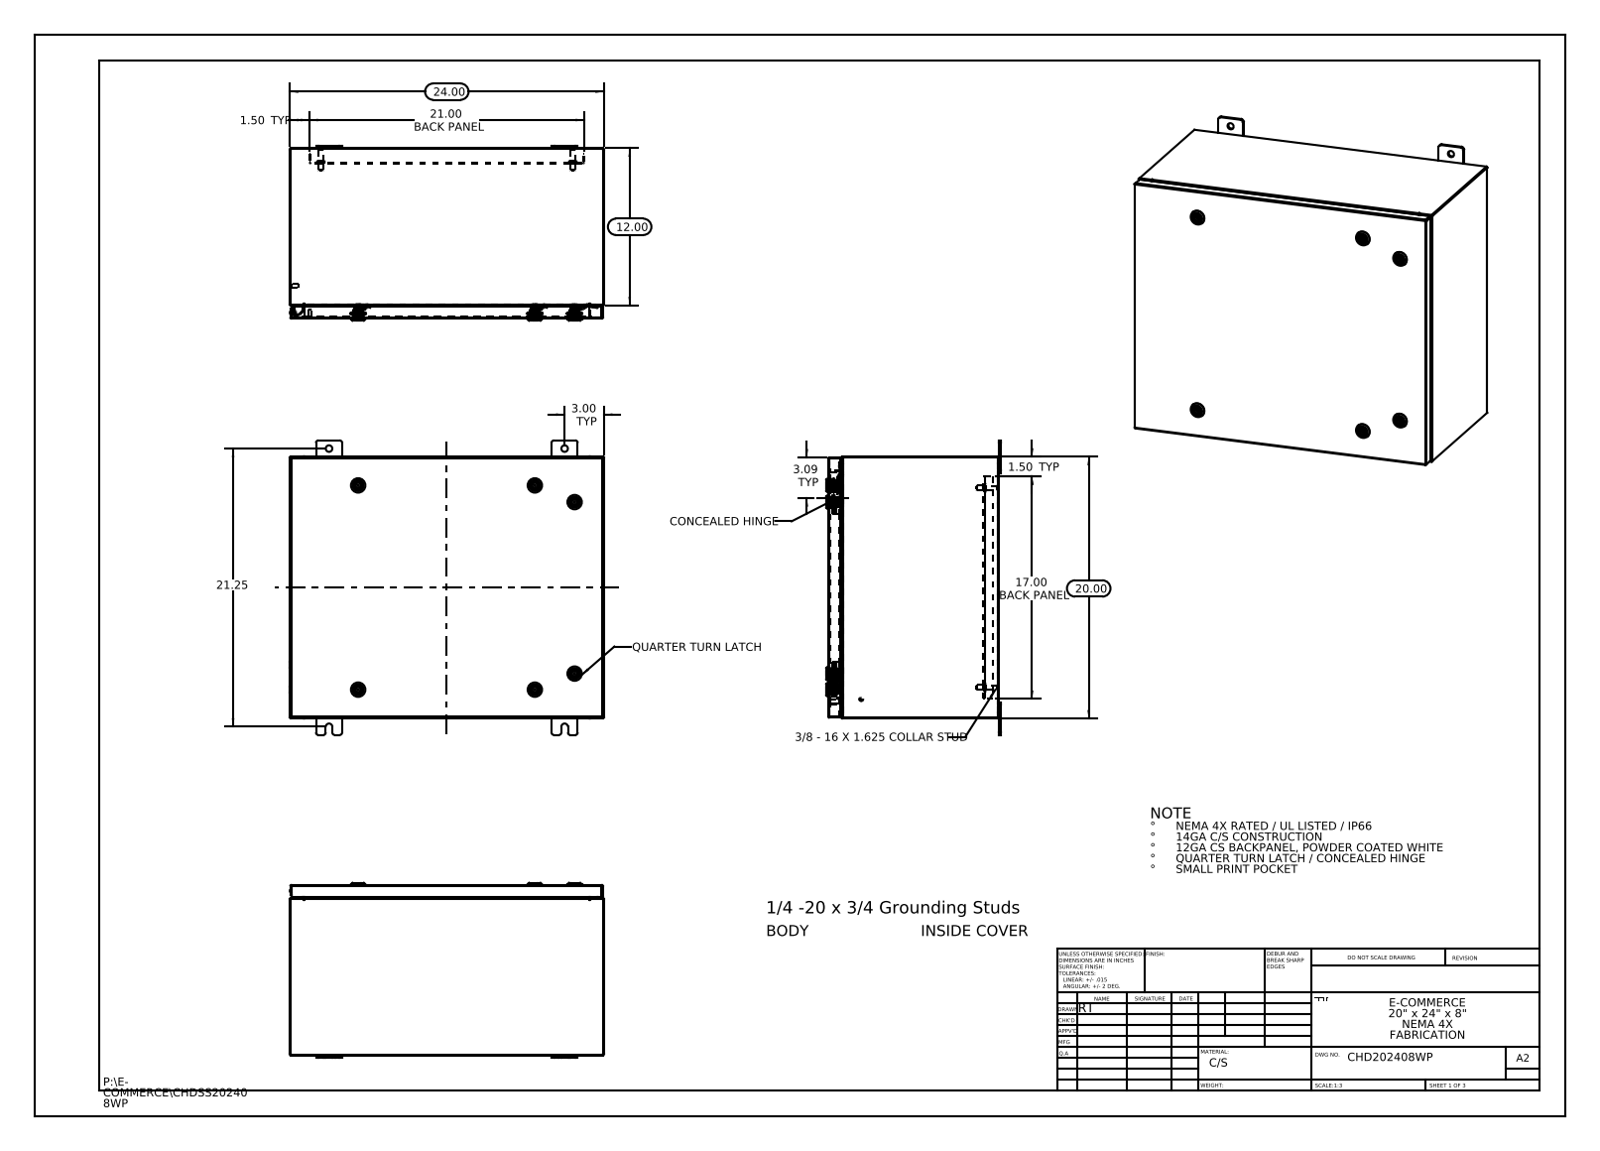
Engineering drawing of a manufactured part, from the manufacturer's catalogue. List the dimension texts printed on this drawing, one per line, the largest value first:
24.00
21.25
21.00 BACK PANEL
20.00
17.00 BACK PANEL
12.00
3.09 TYP
3.00 TYP
1.50 TYP
1.50 TYP
